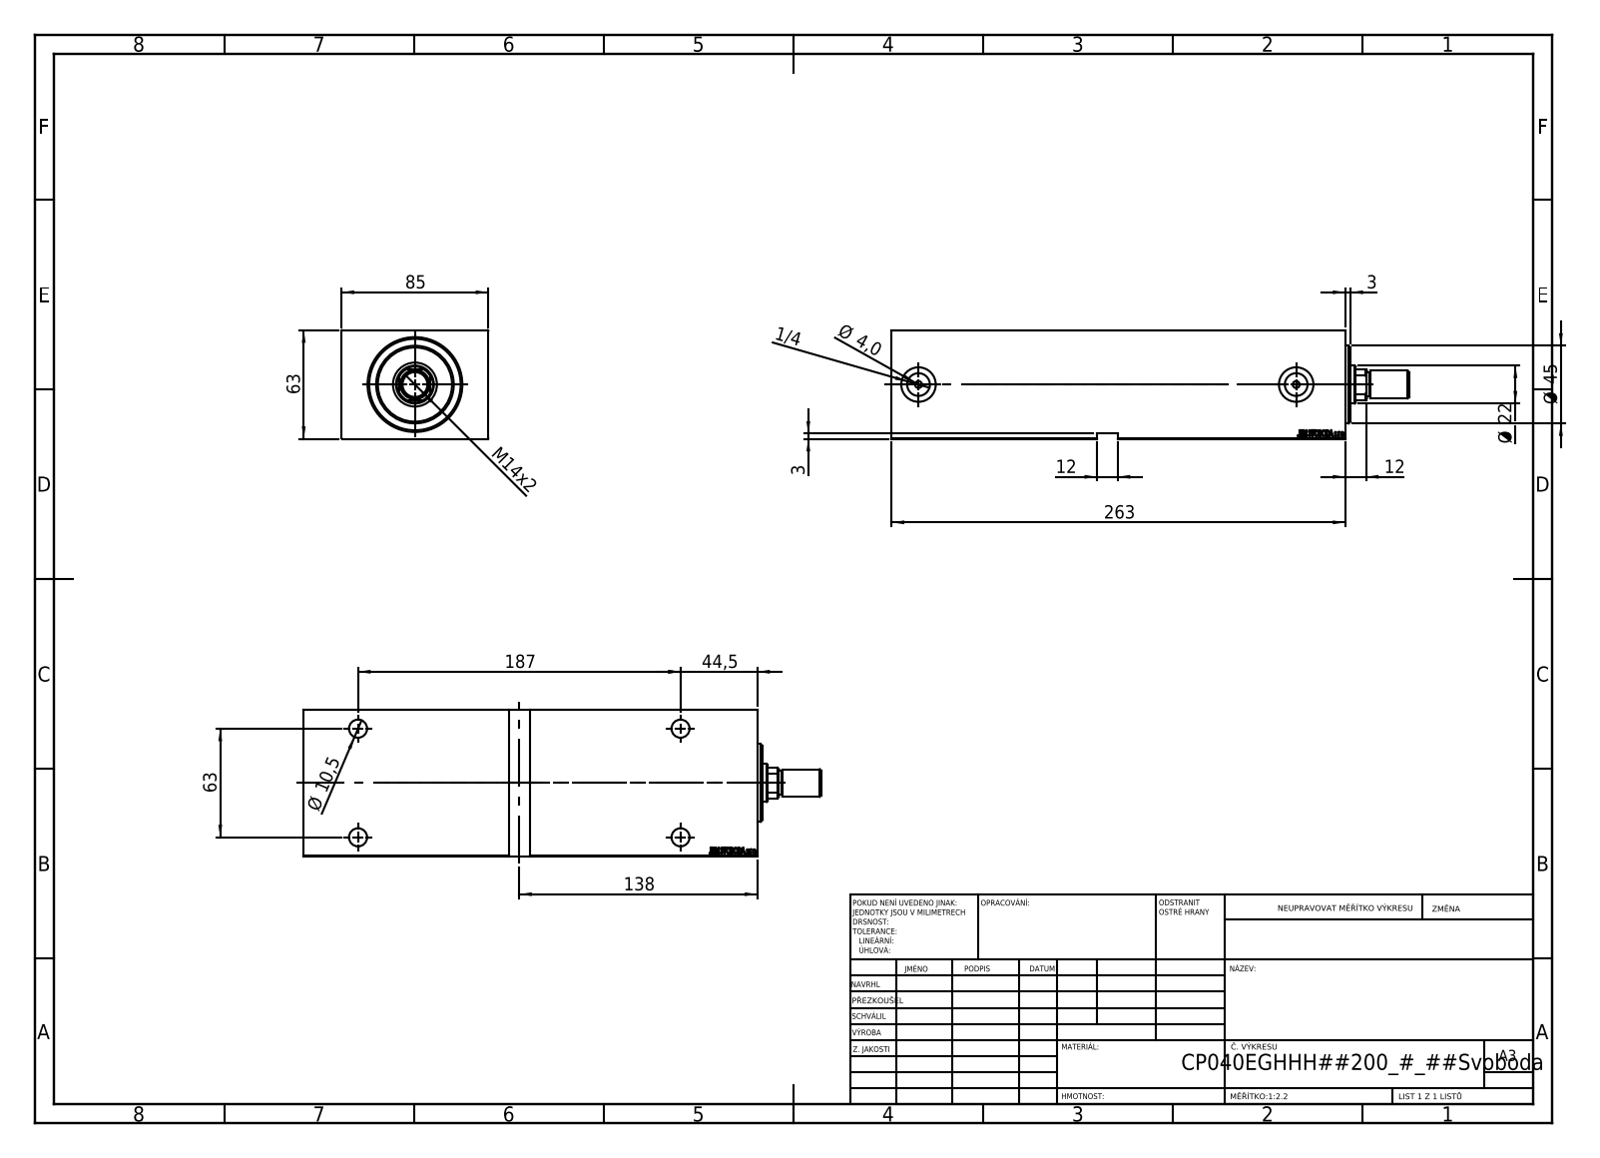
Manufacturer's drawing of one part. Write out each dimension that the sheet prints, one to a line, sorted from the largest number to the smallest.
263
187
138
85
63
63
Ø 45
44,5
Ø 22
M14x2
12
12
Ø 10,5
Ø 4,0
3
3
1/4
